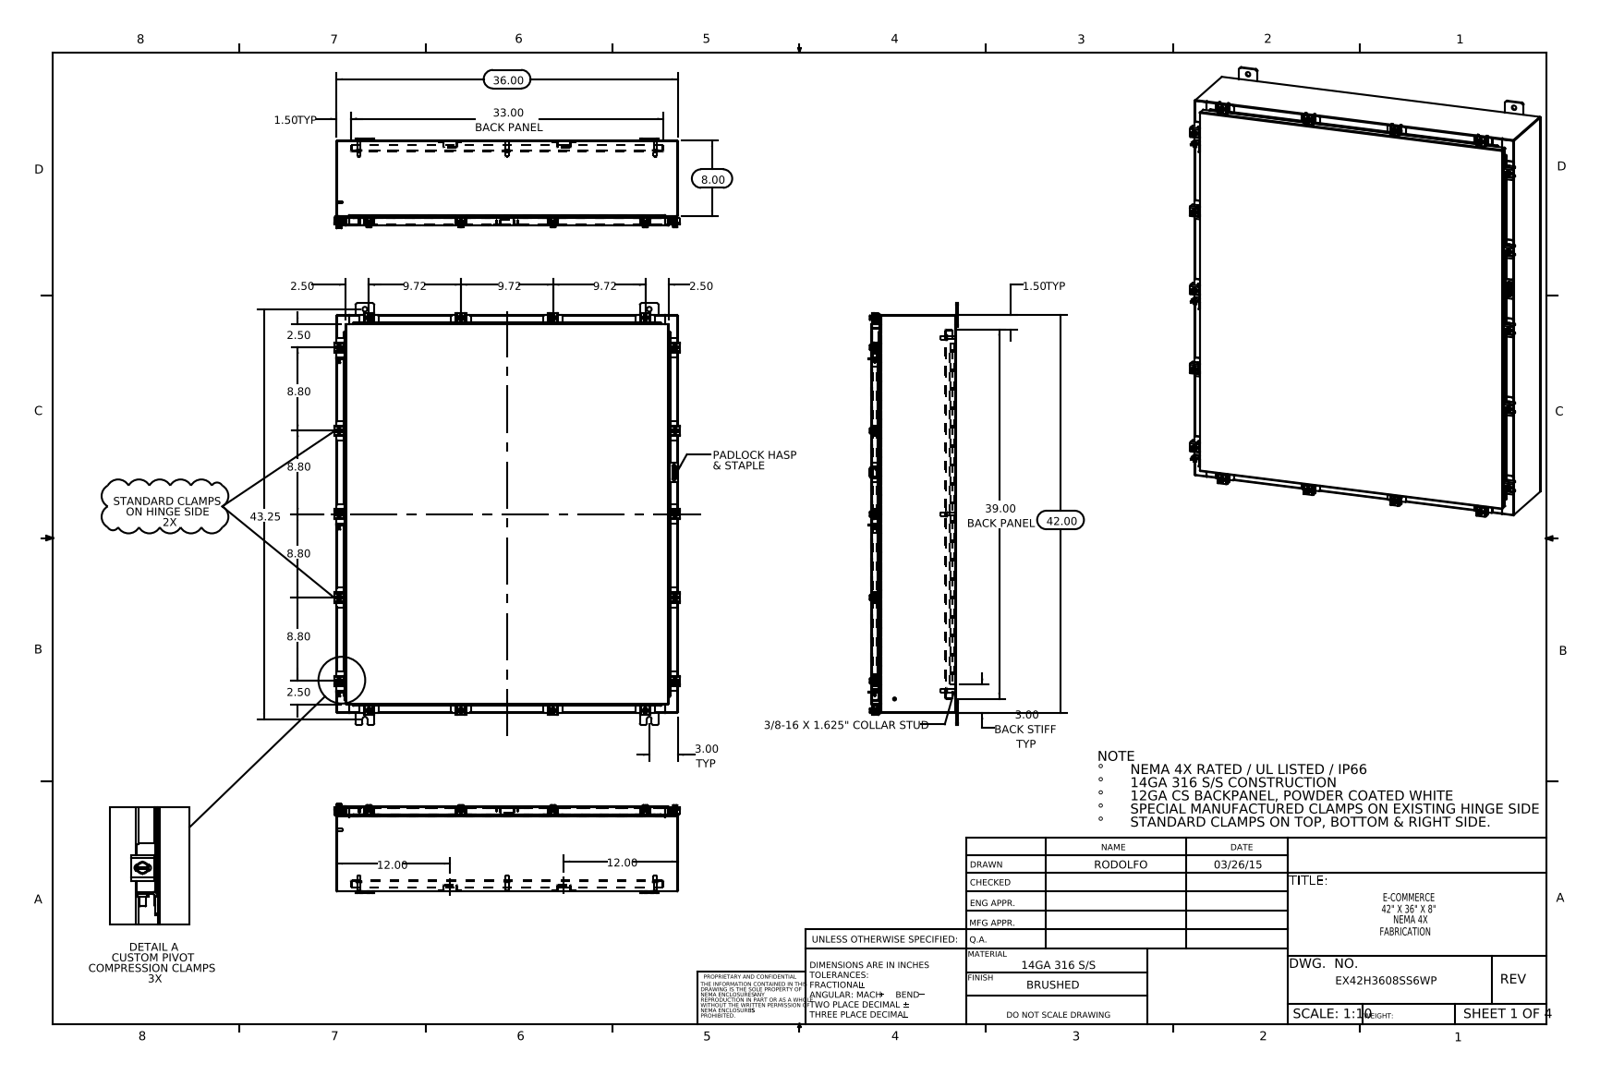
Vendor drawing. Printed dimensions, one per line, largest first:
43.25
42.00
39.00 BACK PANEL
36.00
33.00 BACK PANEL
12.00
12.00
9.72
9.72
9.72
8.80
8.80
8.80
8.80
8.00
3.00 TYP
3.00 BACK STIFF TYP
2.50
2.50
2.50
2.50
1.50 TYP
1.50 TYP
